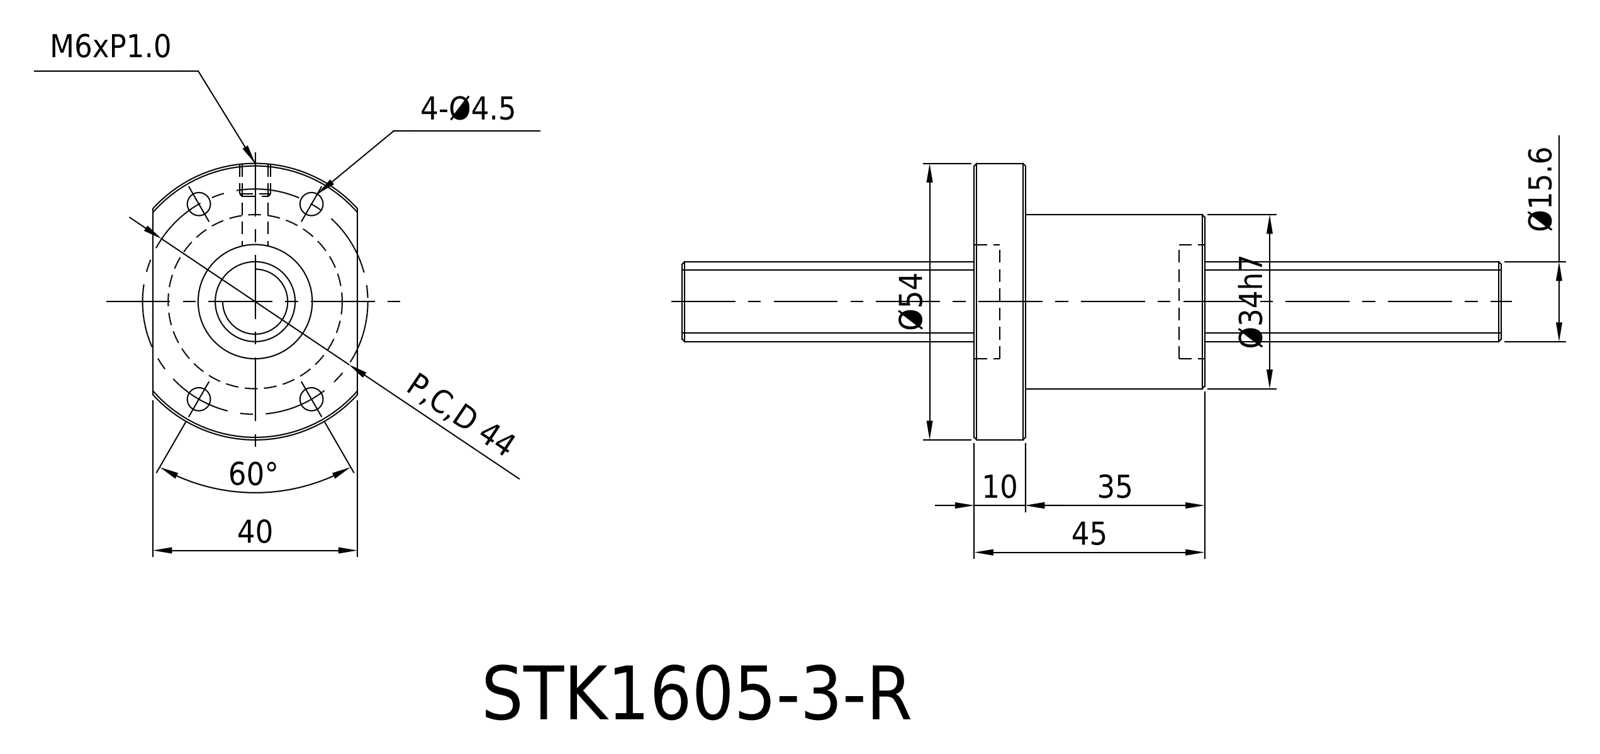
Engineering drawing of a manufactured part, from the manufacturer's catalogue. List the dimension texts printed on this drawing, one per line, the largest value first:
60°
Ø54
45
P,C,D 44
40
35
Ø34h7
Ø15.6
10
